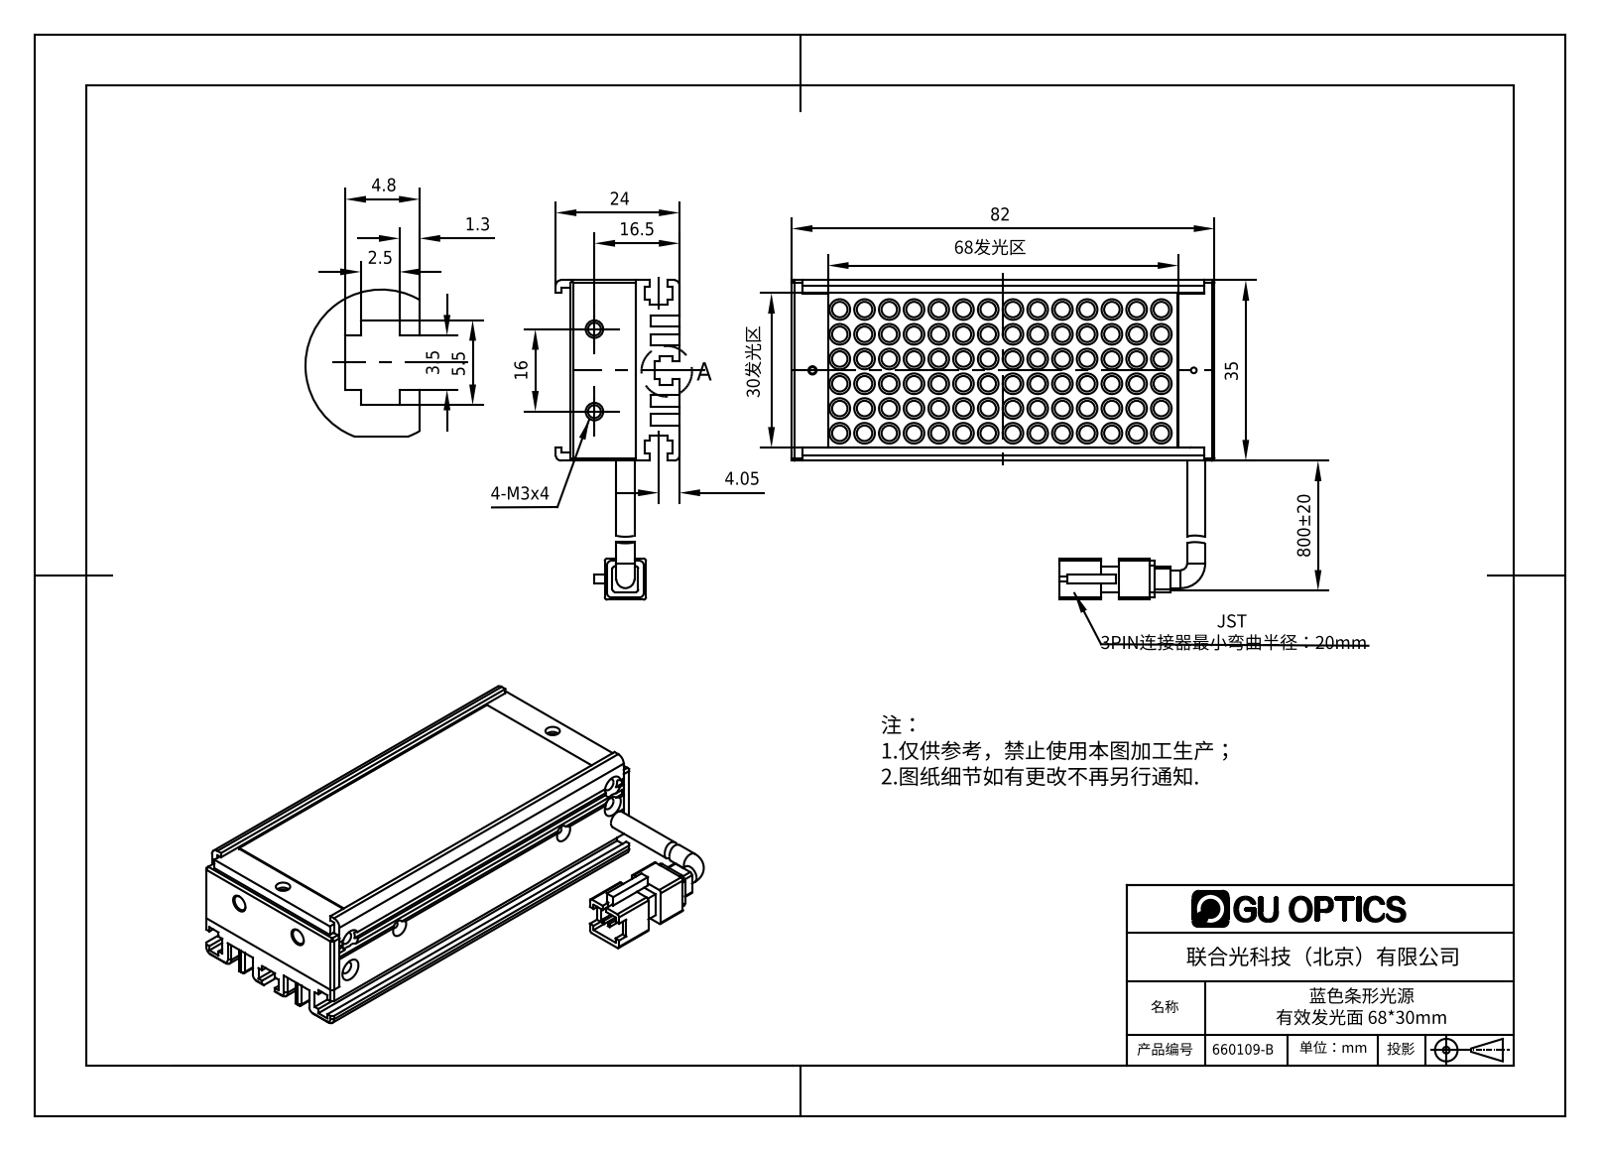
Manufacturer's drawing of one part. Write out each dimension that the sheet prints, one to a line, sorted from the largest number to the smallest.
800±20
82
68发光区
35
30发光区
24
16.5
16
5.5
4.8
4.05
3.5
2.5
1.3
